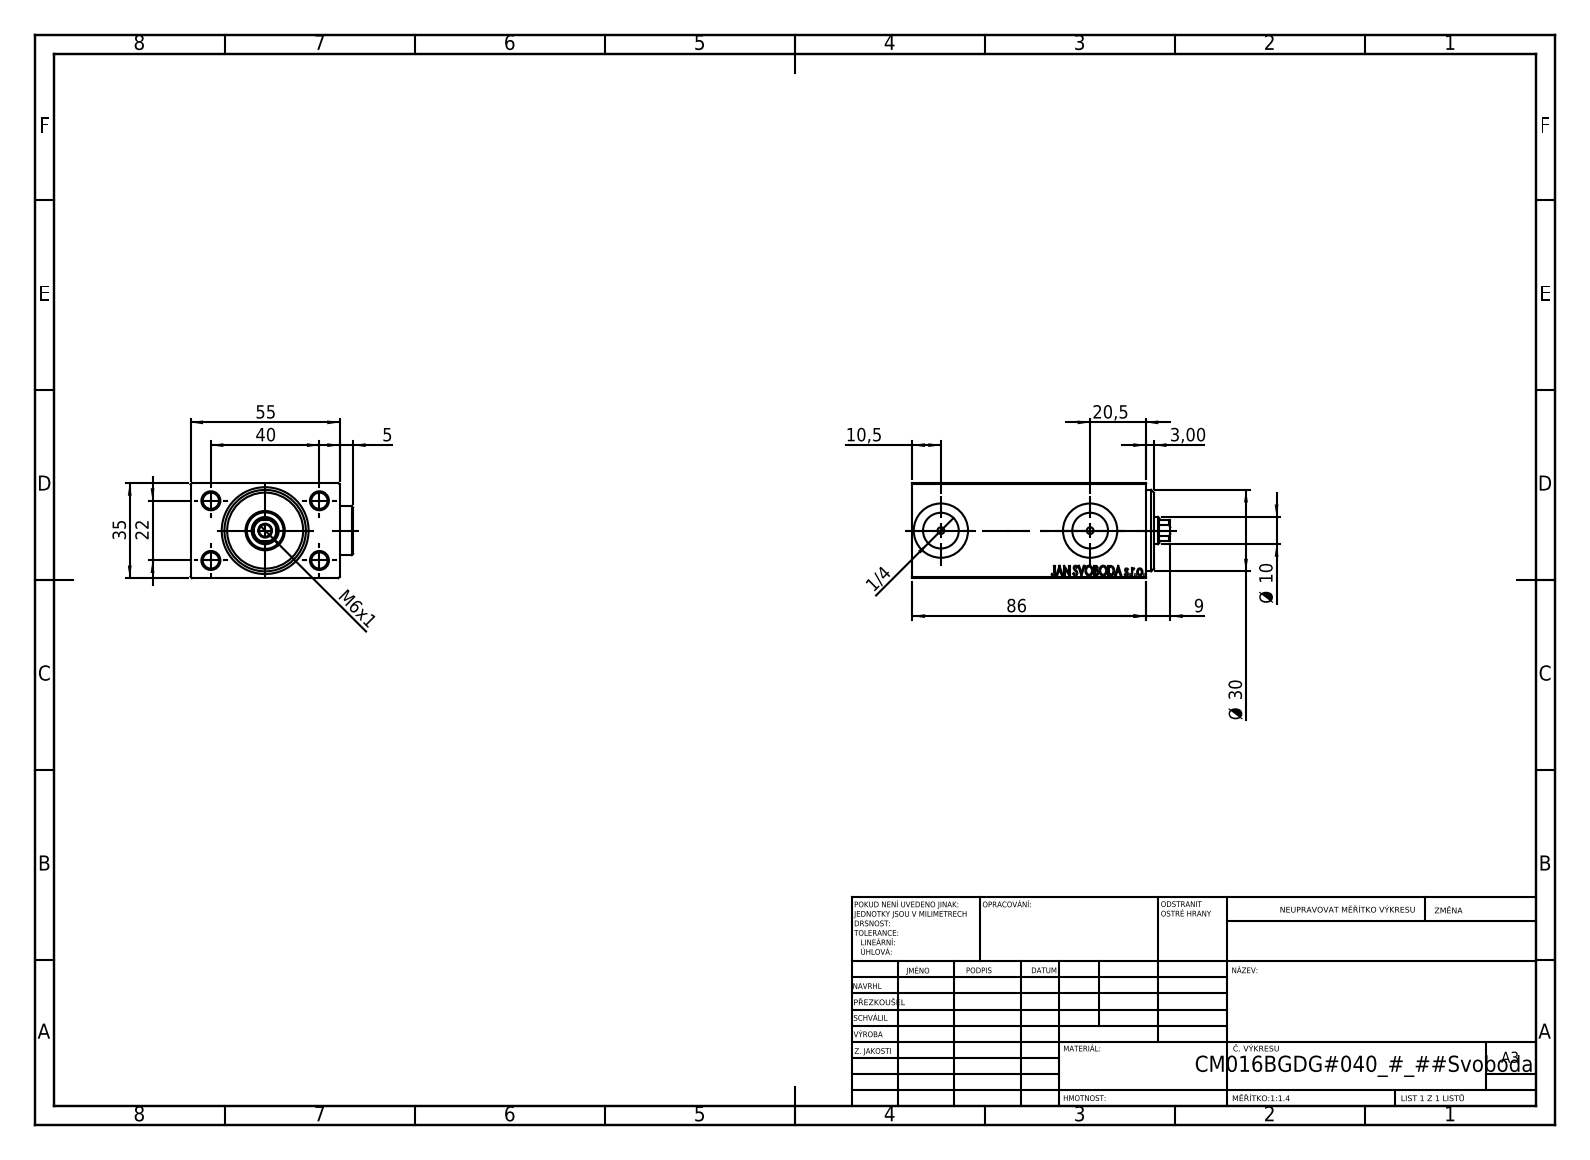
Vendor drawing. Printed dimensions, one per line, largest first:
86
55
40
35
Ø 30
22
20,5
10,5
Ø 10
9
M6x1
5
3,00
1/4
